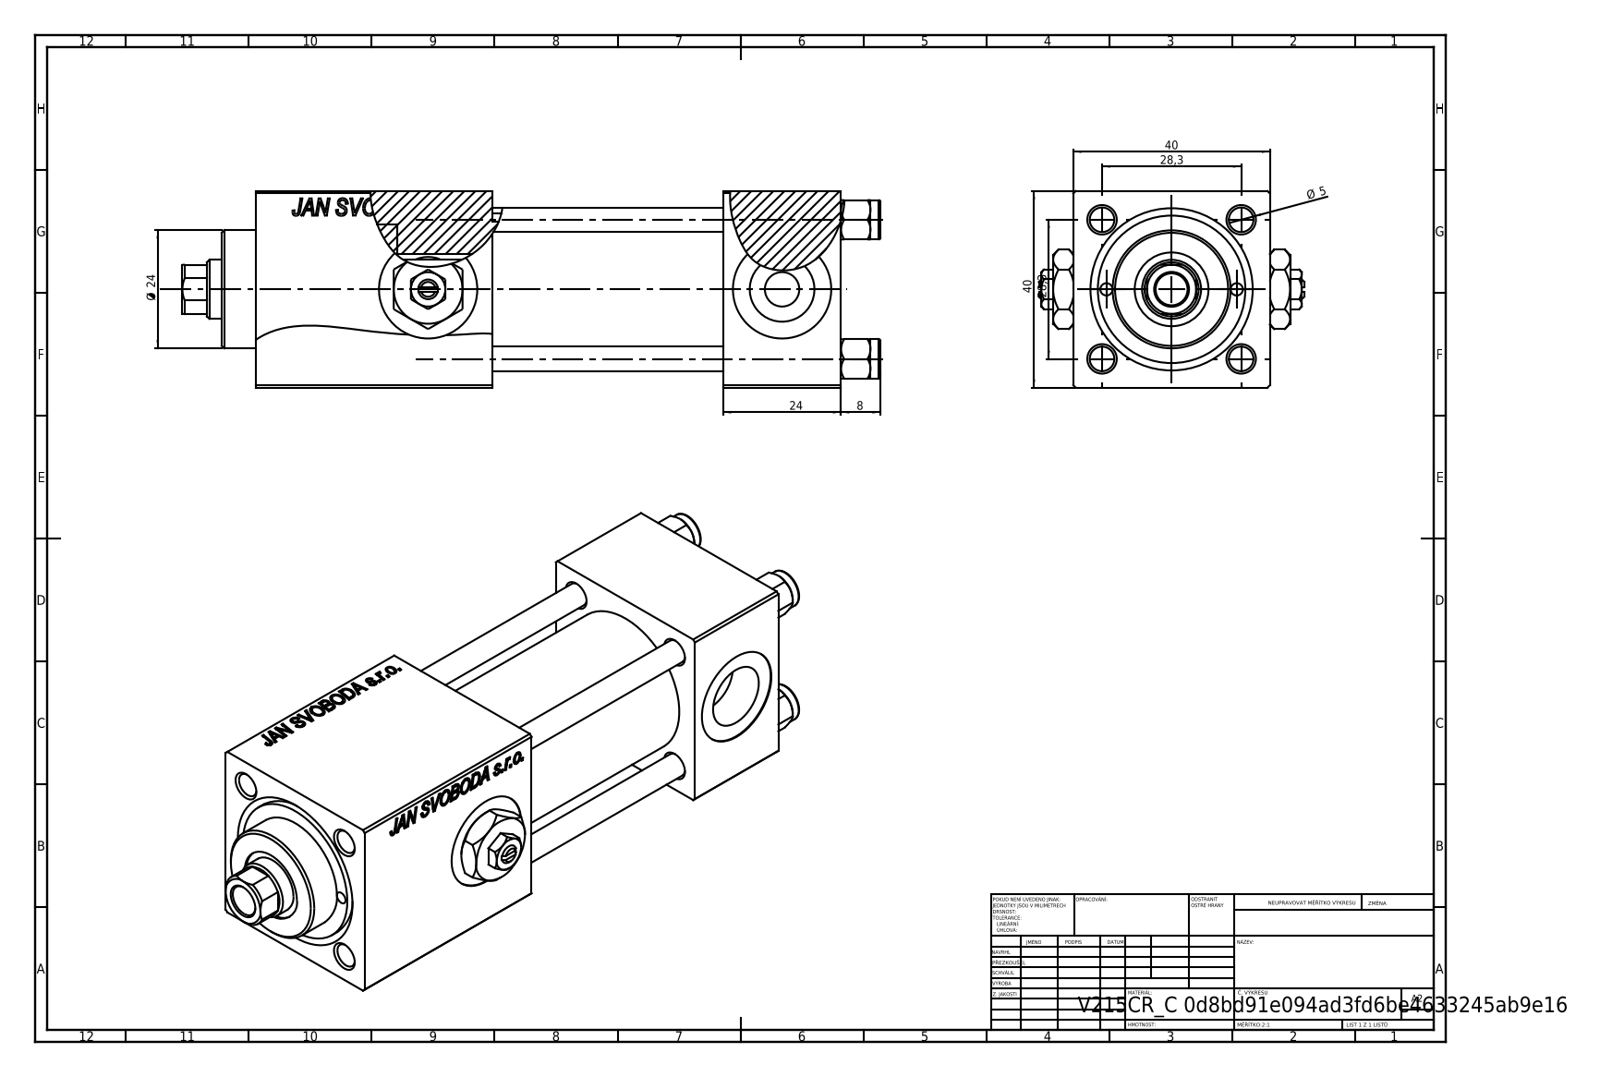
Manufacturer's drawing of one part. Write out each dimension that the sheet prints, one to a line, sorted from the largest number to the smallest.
40
40
28,3
28,3
24
Ø 24
8
Ø 5
